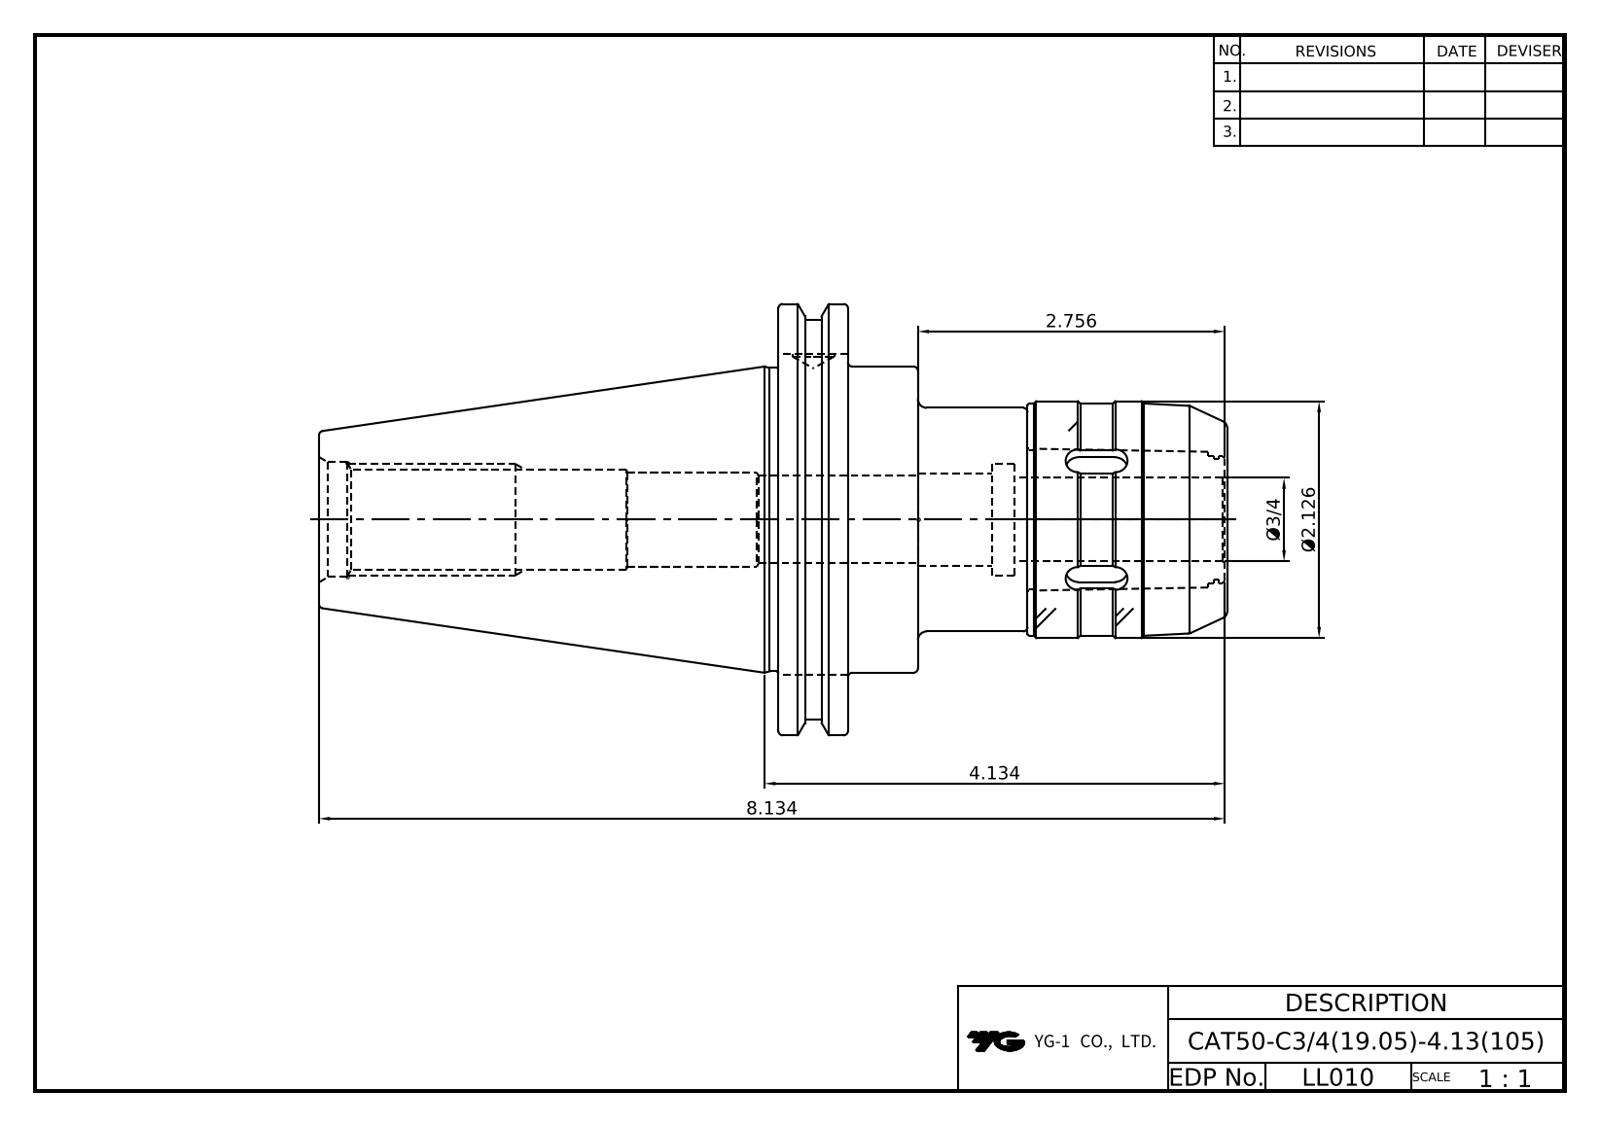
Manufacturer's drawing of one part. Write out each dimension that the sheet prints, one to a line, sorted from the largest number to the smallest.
8.134
4.134
2.756
Ø2.126
Ø3/4
